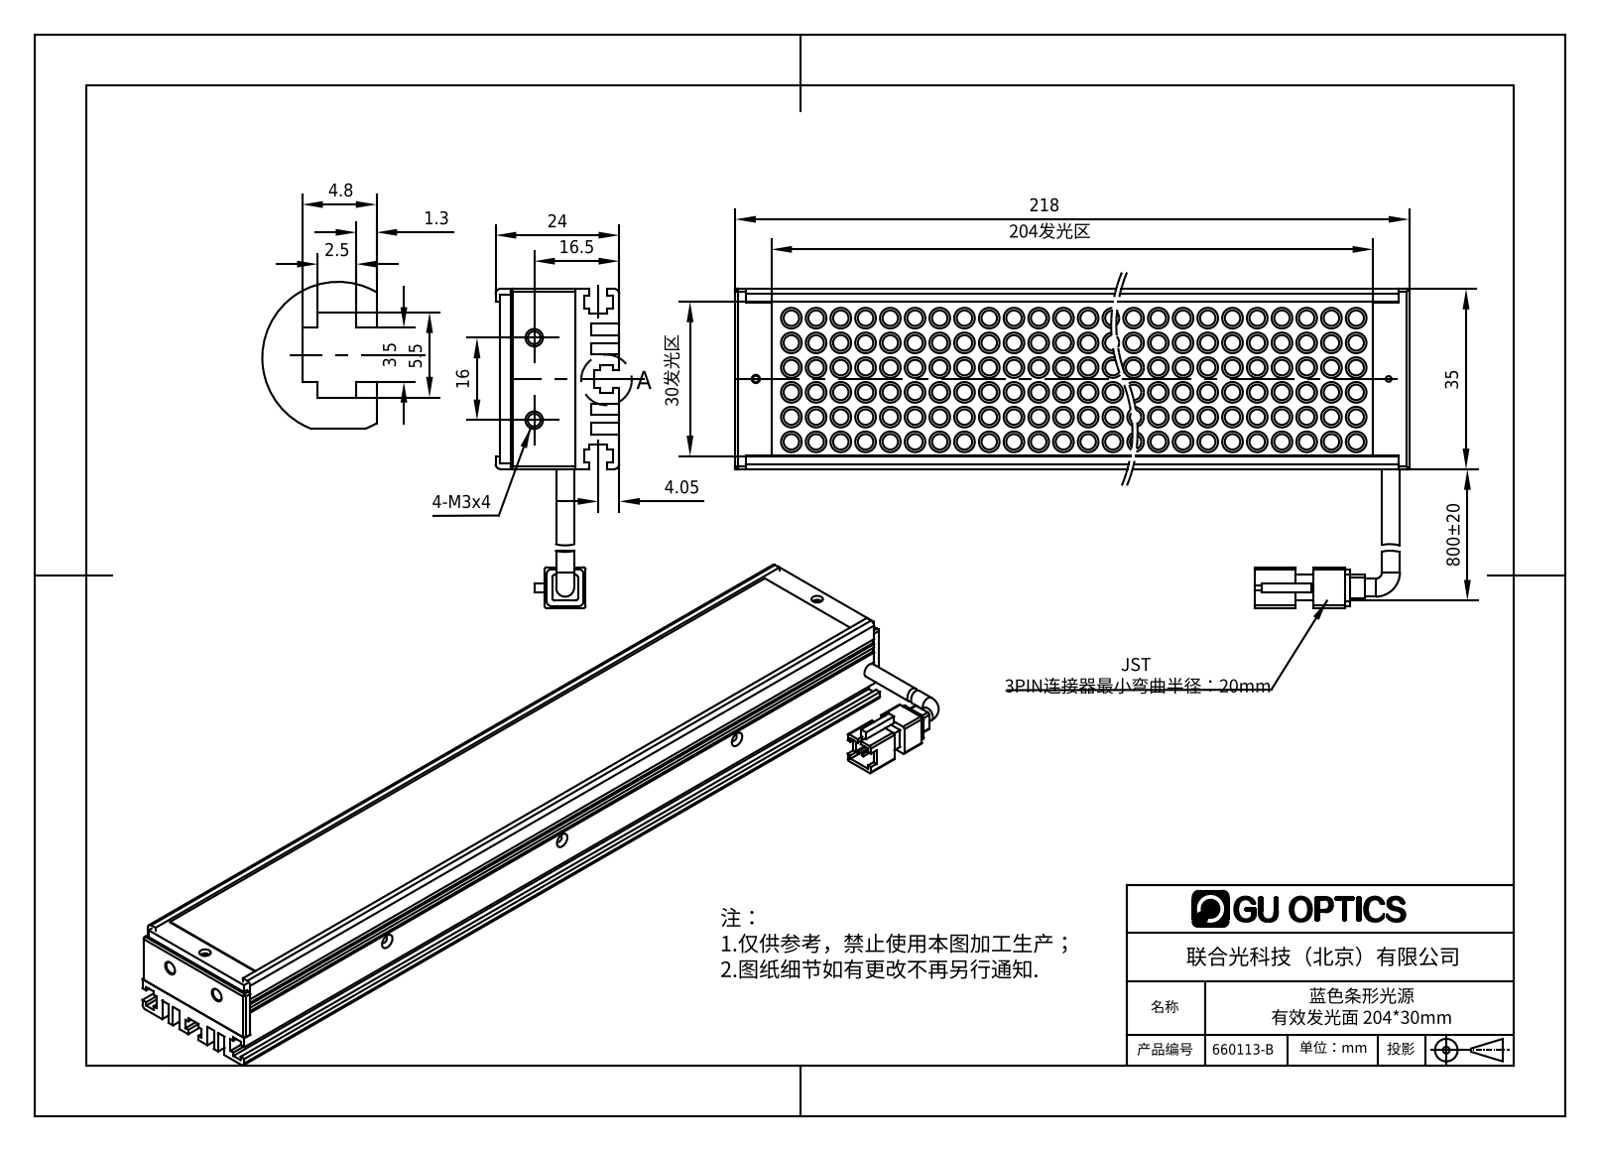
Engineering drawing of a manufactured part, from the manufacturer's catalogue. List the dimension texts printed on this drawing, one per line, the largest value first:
800±20
218
204发光区
35
30发光区
24
16.5
16
5.5
4.8
4.05
3.5
2.5
1.3
